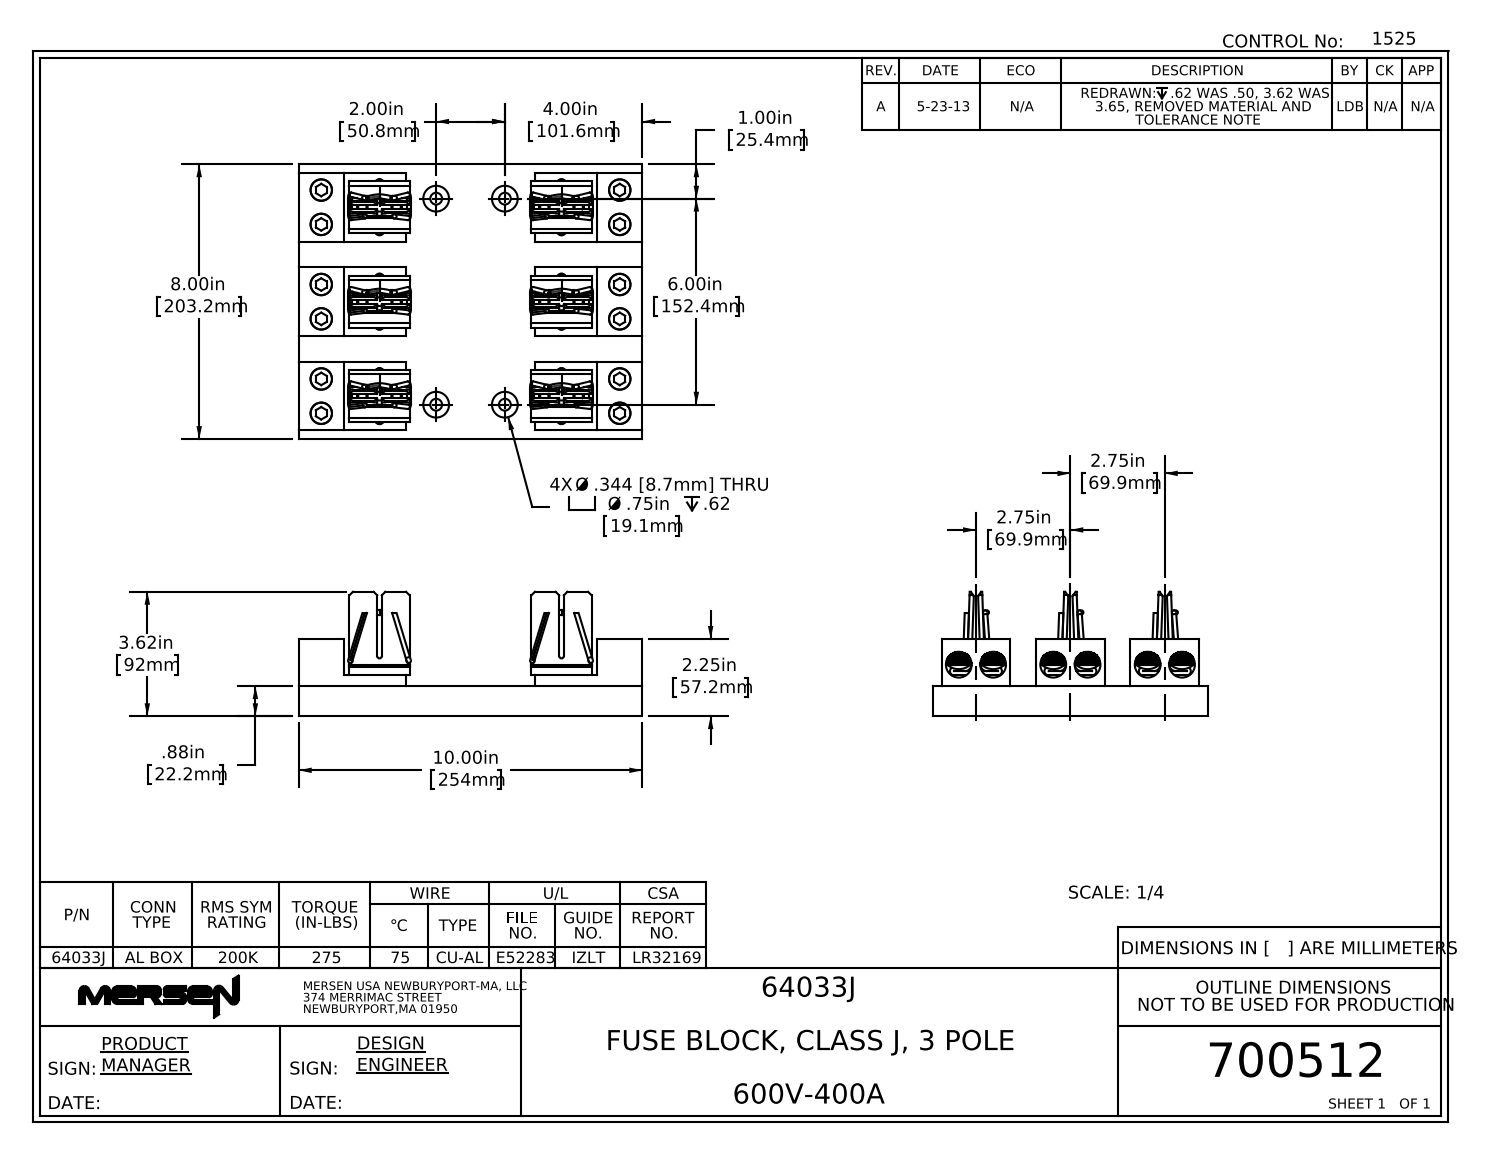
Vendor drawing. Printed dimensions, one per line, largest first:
10.00in 254mm
8.00in 203.2mm
6.00in 152.4mm
4.00in 101.6mm
3.62in 92mm
2.75in 69.9mm
2.75in 69.9mm
2.25in 57.2mm
2.00in 50.8mm
1.00in 25.4mm
.88in 22.2mm
4X Ø .344 [8.7mm] THRU Ø .75in 19.1mm .62
